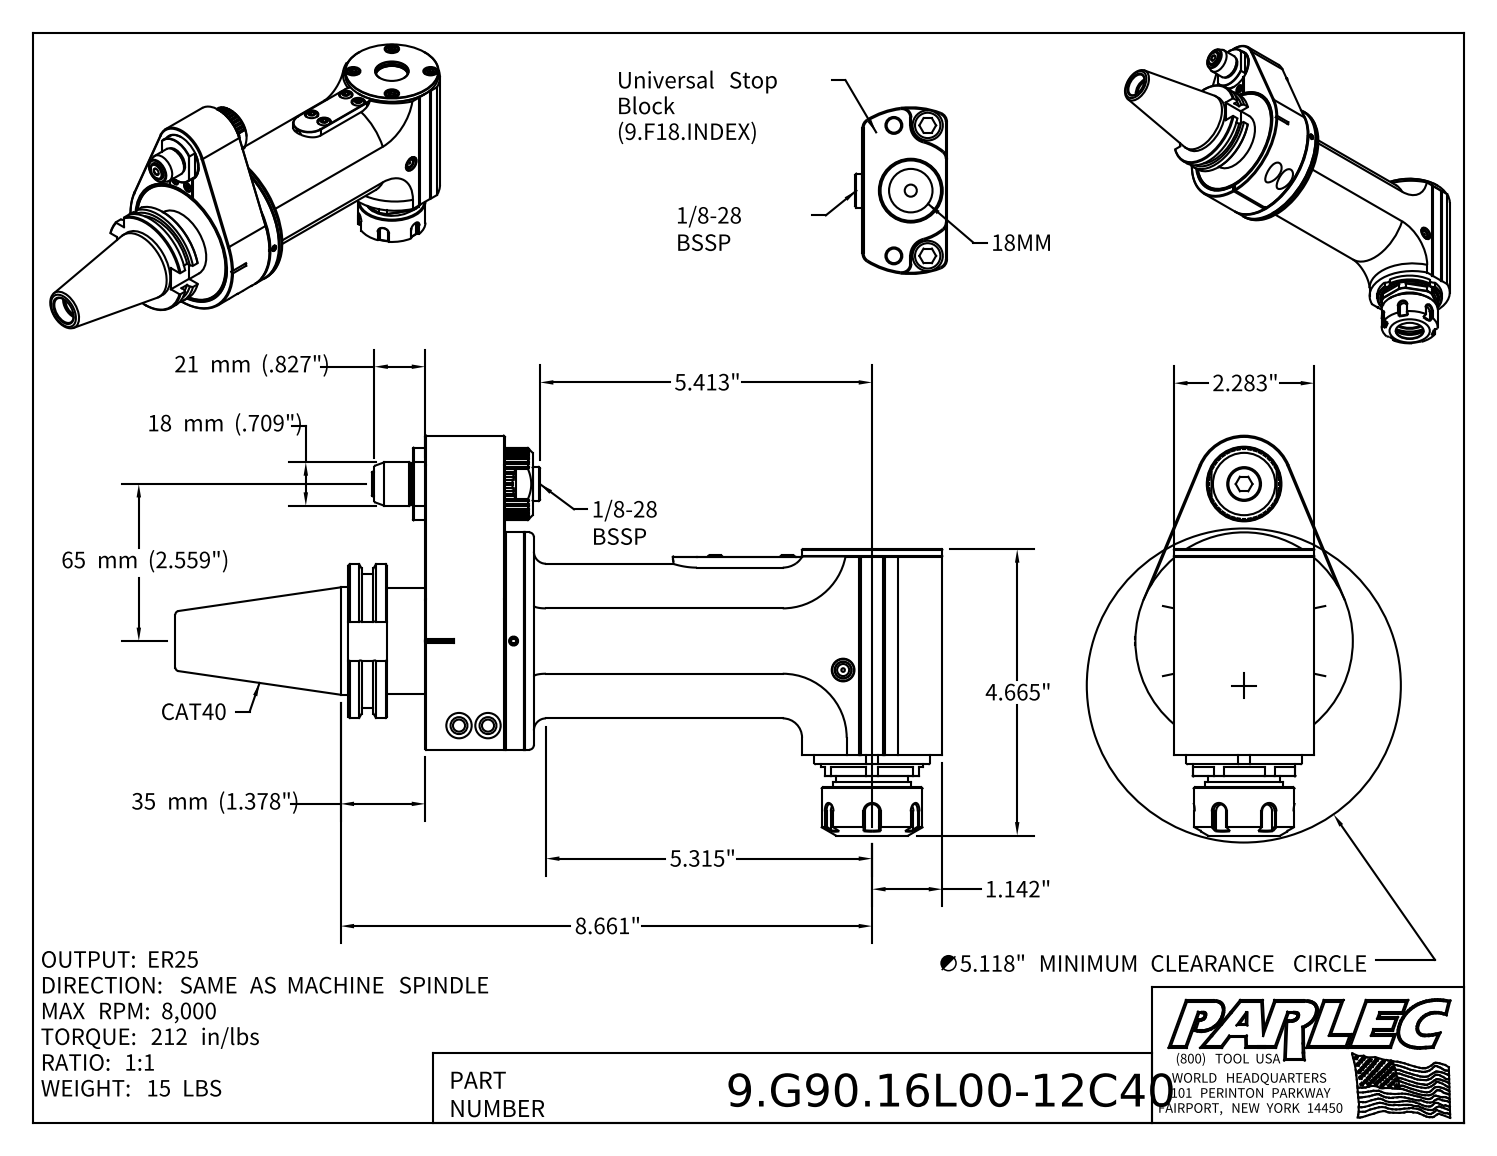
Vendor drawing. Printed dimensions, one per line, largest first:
65 mm (2.559")
35 mm (1.378")
21 mm (.827")
18 mm (.709")
8.661"
5.413"
5.315"
∅5.118" MINIMUM CLEARANCE CIRCLE
4.665"
2.283"
1.142"
